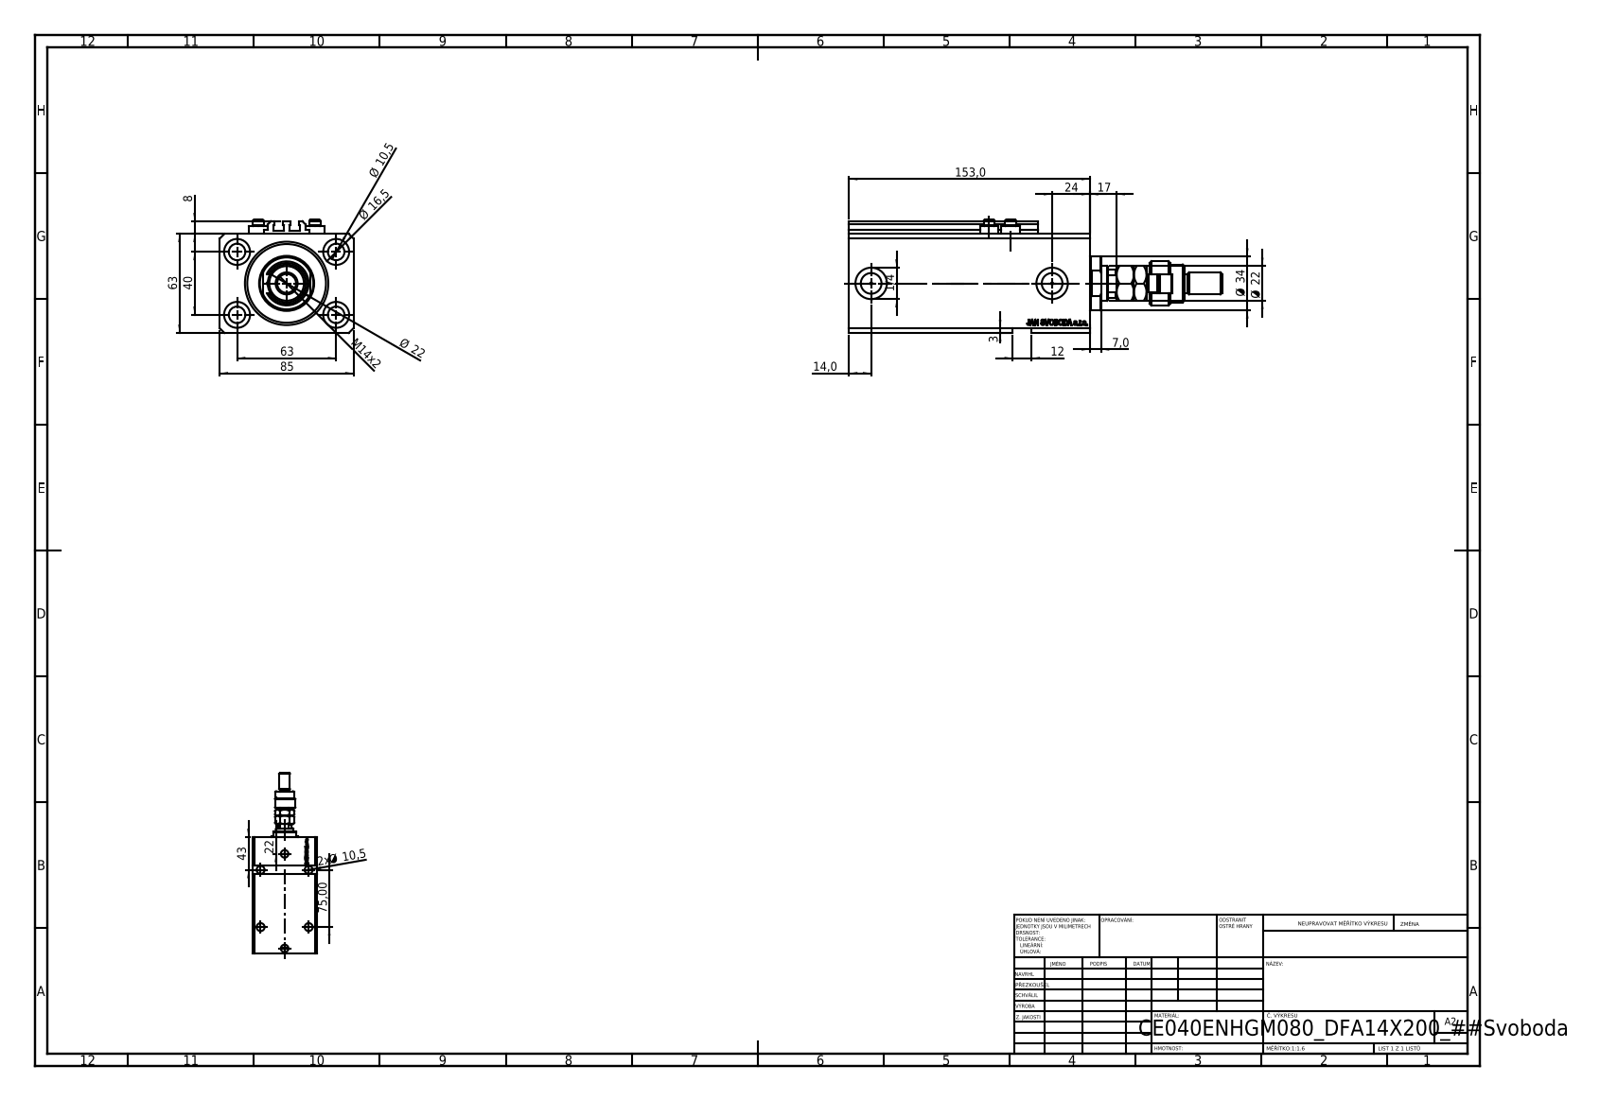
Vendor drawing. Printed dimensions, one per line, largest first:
153,0
85
75,00
63
63
43
40
Ø 34
24
Ø 22
Ø 22
22
17
Ø 16,5
M14x2
14,0
12
Ø 10,5
2x Ø 10,5
8
7,0
3
1/4
